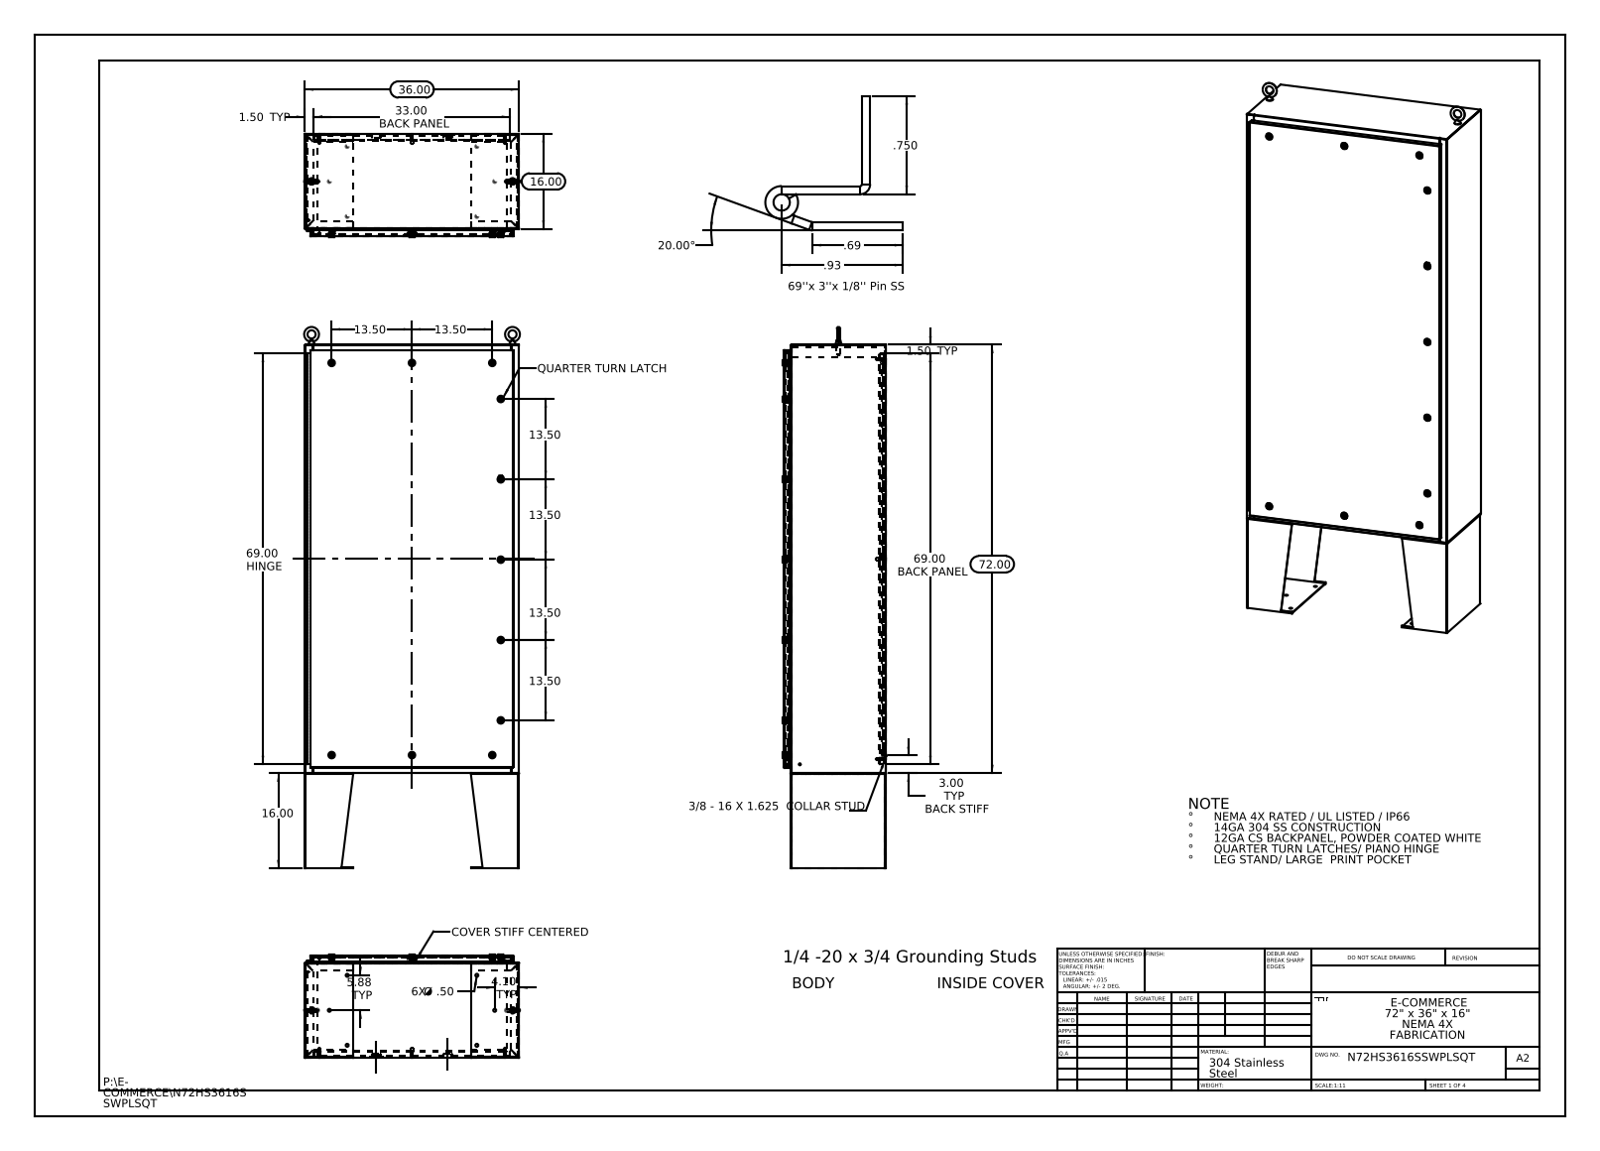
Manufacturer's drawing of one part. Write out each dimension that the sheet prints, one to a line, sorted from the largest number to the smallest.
72.00
69.00 HINGE
69.00 BACK PANEL
36.00
33.00 BACK PANEL
20.00°
16.00
16.00
13.50
13.50
13.50
13.50
13.50
13.50
5.88 TYP
4.10 TYP
3.00 TYP BACK STIFF
1.50 TYP
1.50 TYP
.93
.750
.69
6X Ø .50
